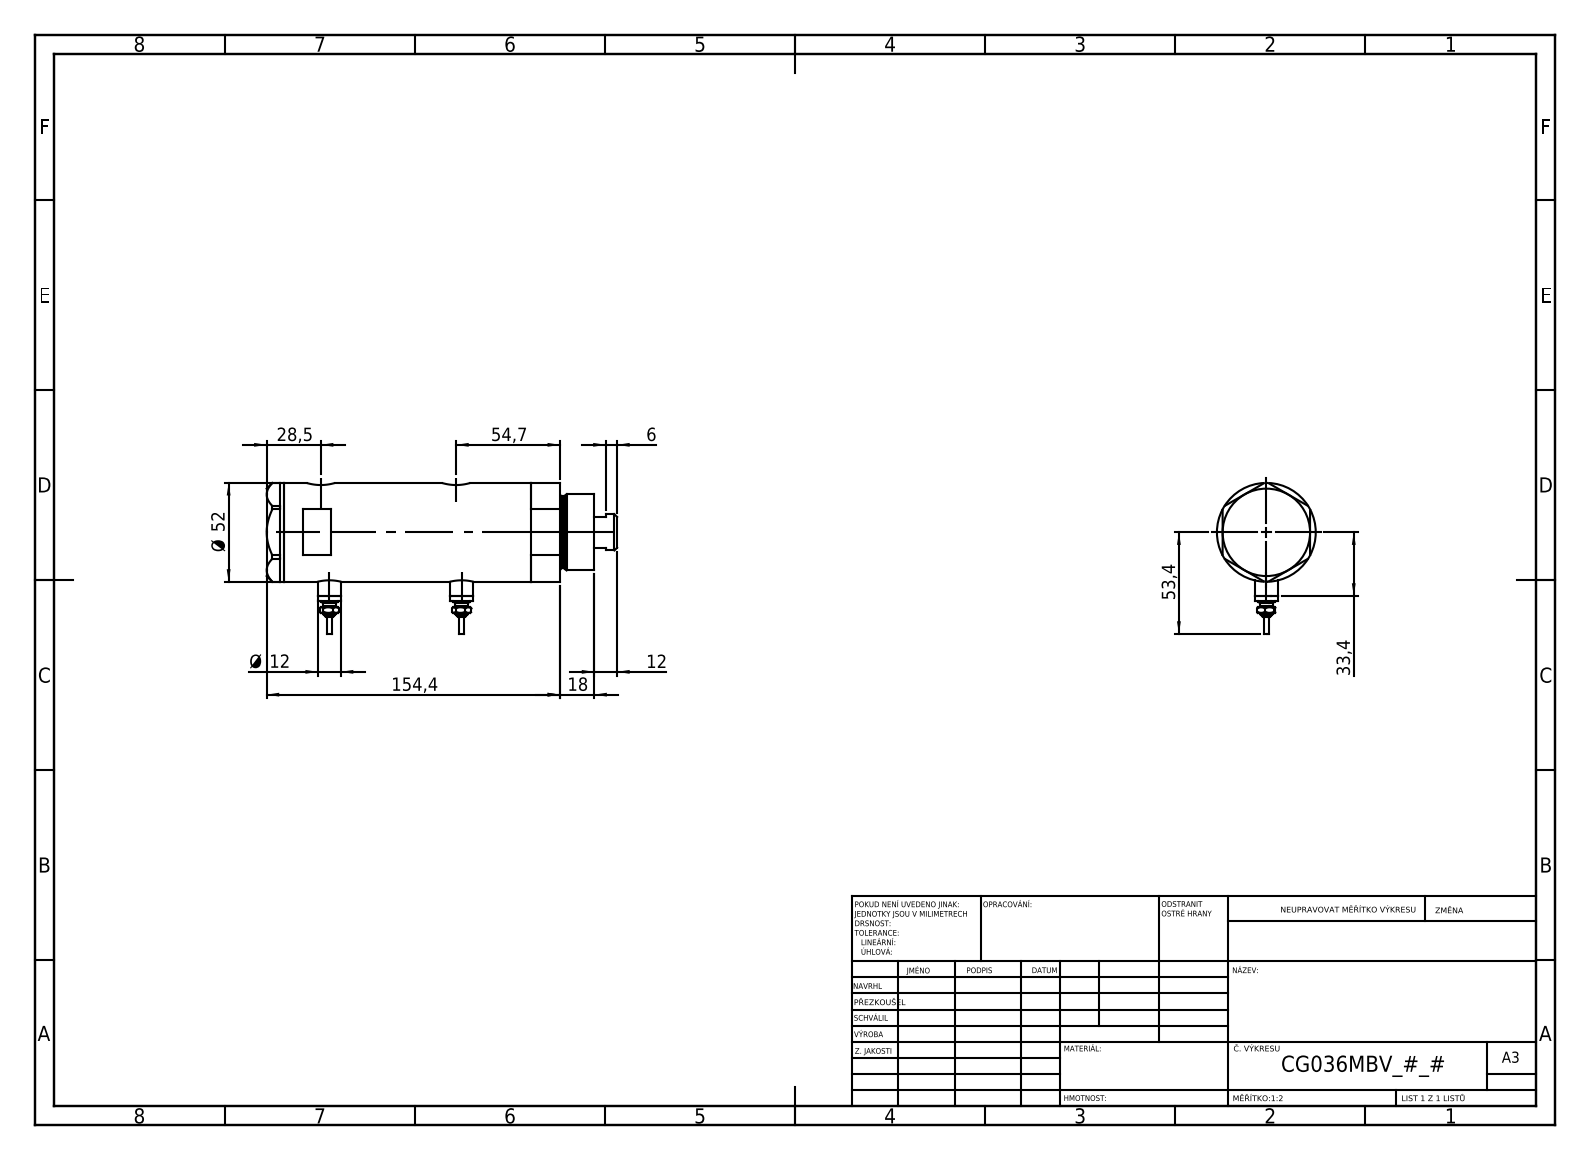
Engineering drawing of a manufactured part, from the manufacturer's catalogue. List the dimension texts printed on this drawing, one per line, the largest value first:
154,4
54,7
53,4
Ø 52
33,4
28,5
18
12
Ø 12
6
